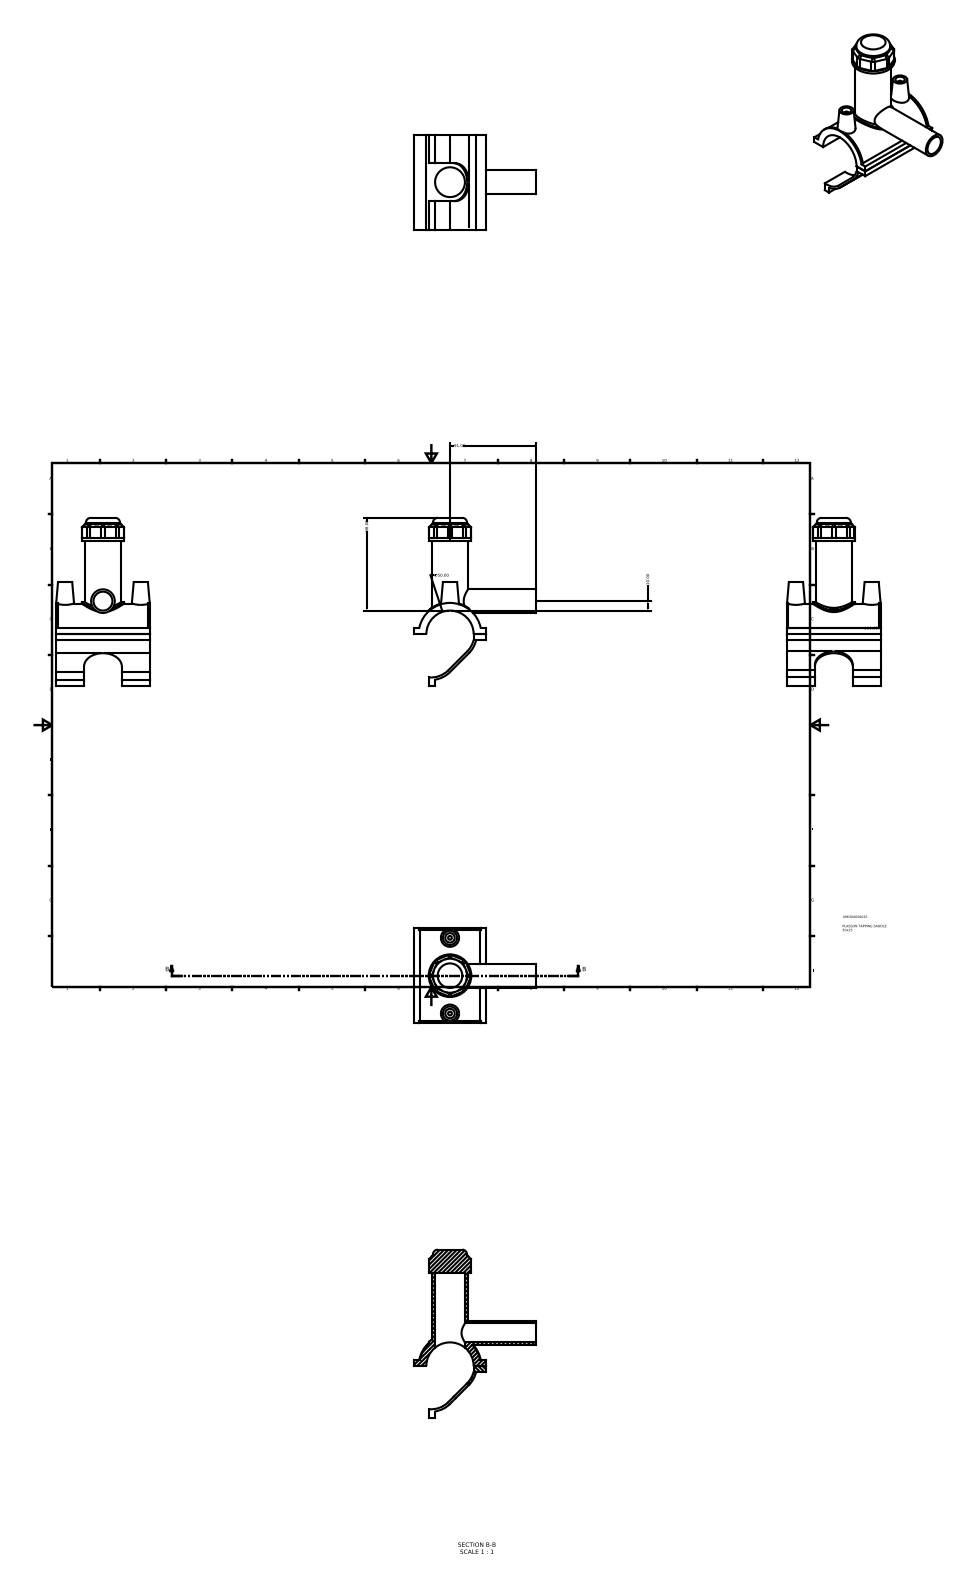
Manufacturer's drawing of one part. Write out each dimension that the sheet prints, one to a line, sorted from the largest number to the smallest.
100.00
98.00
91.00
∅50.00
10.00
